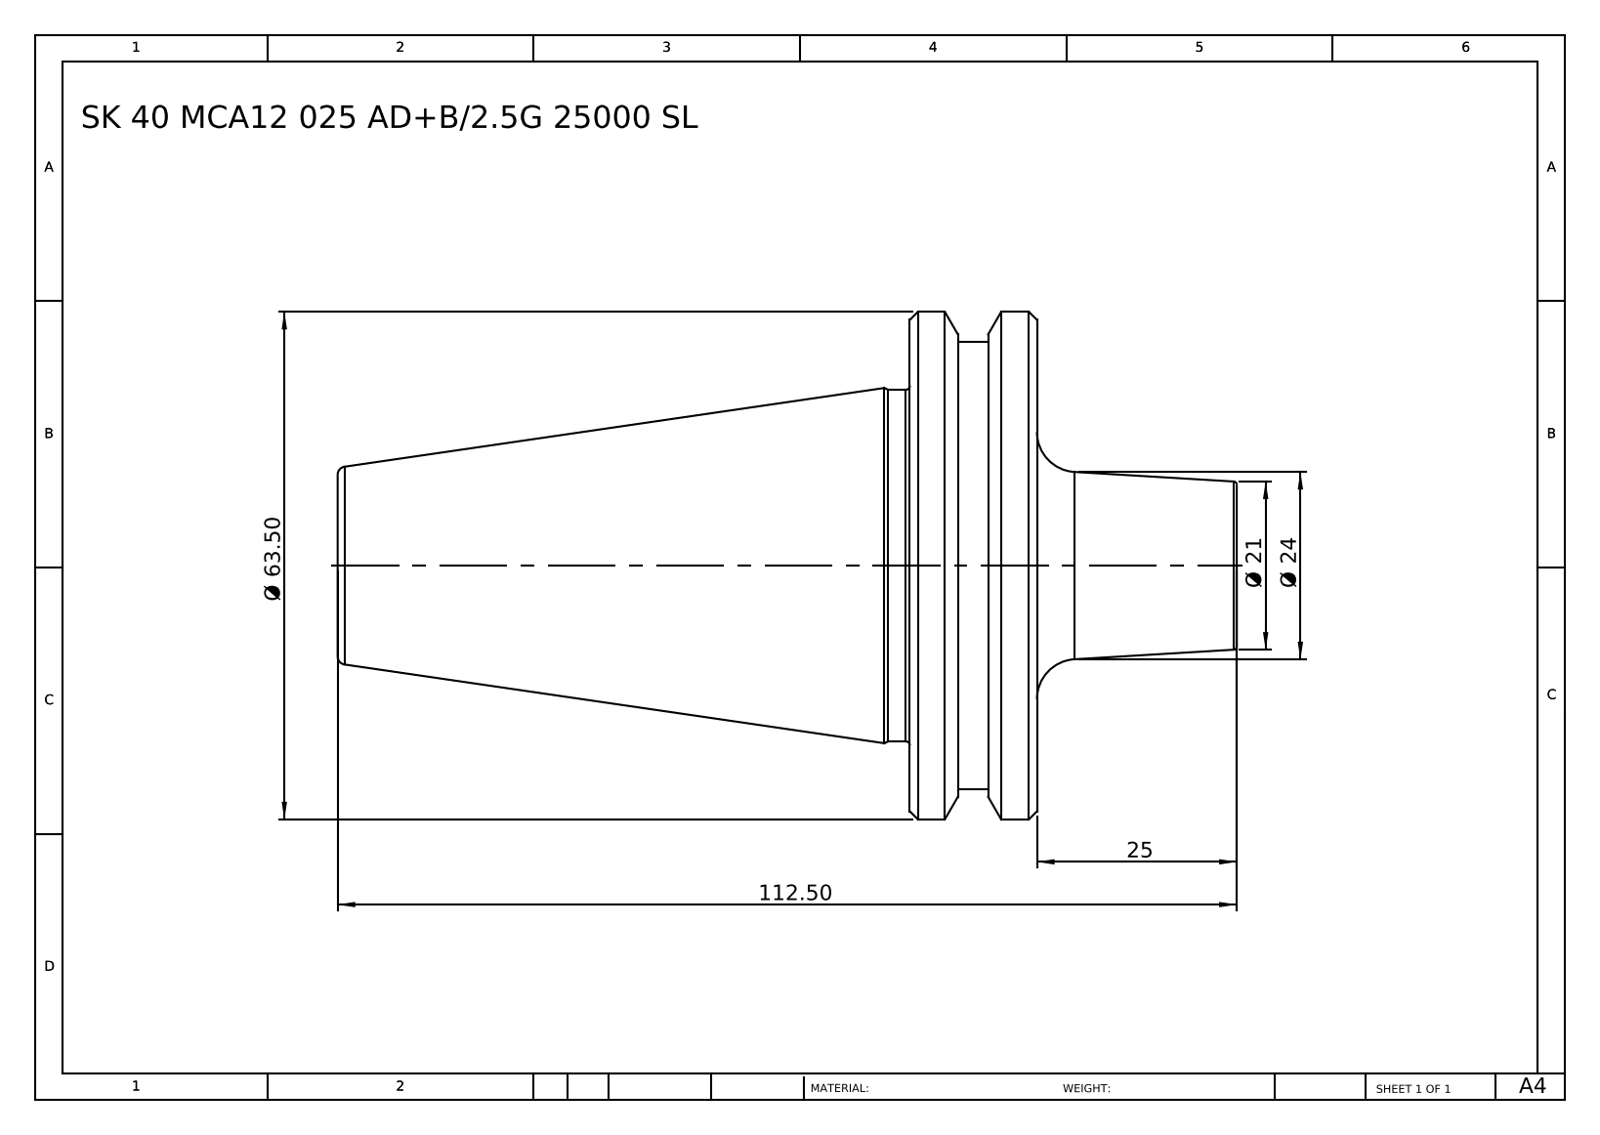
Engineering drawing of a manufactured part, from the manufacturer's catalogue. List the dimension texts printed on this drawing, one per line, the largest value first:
112.50
Ø 63.50
25
Ø 24
Ø 21
